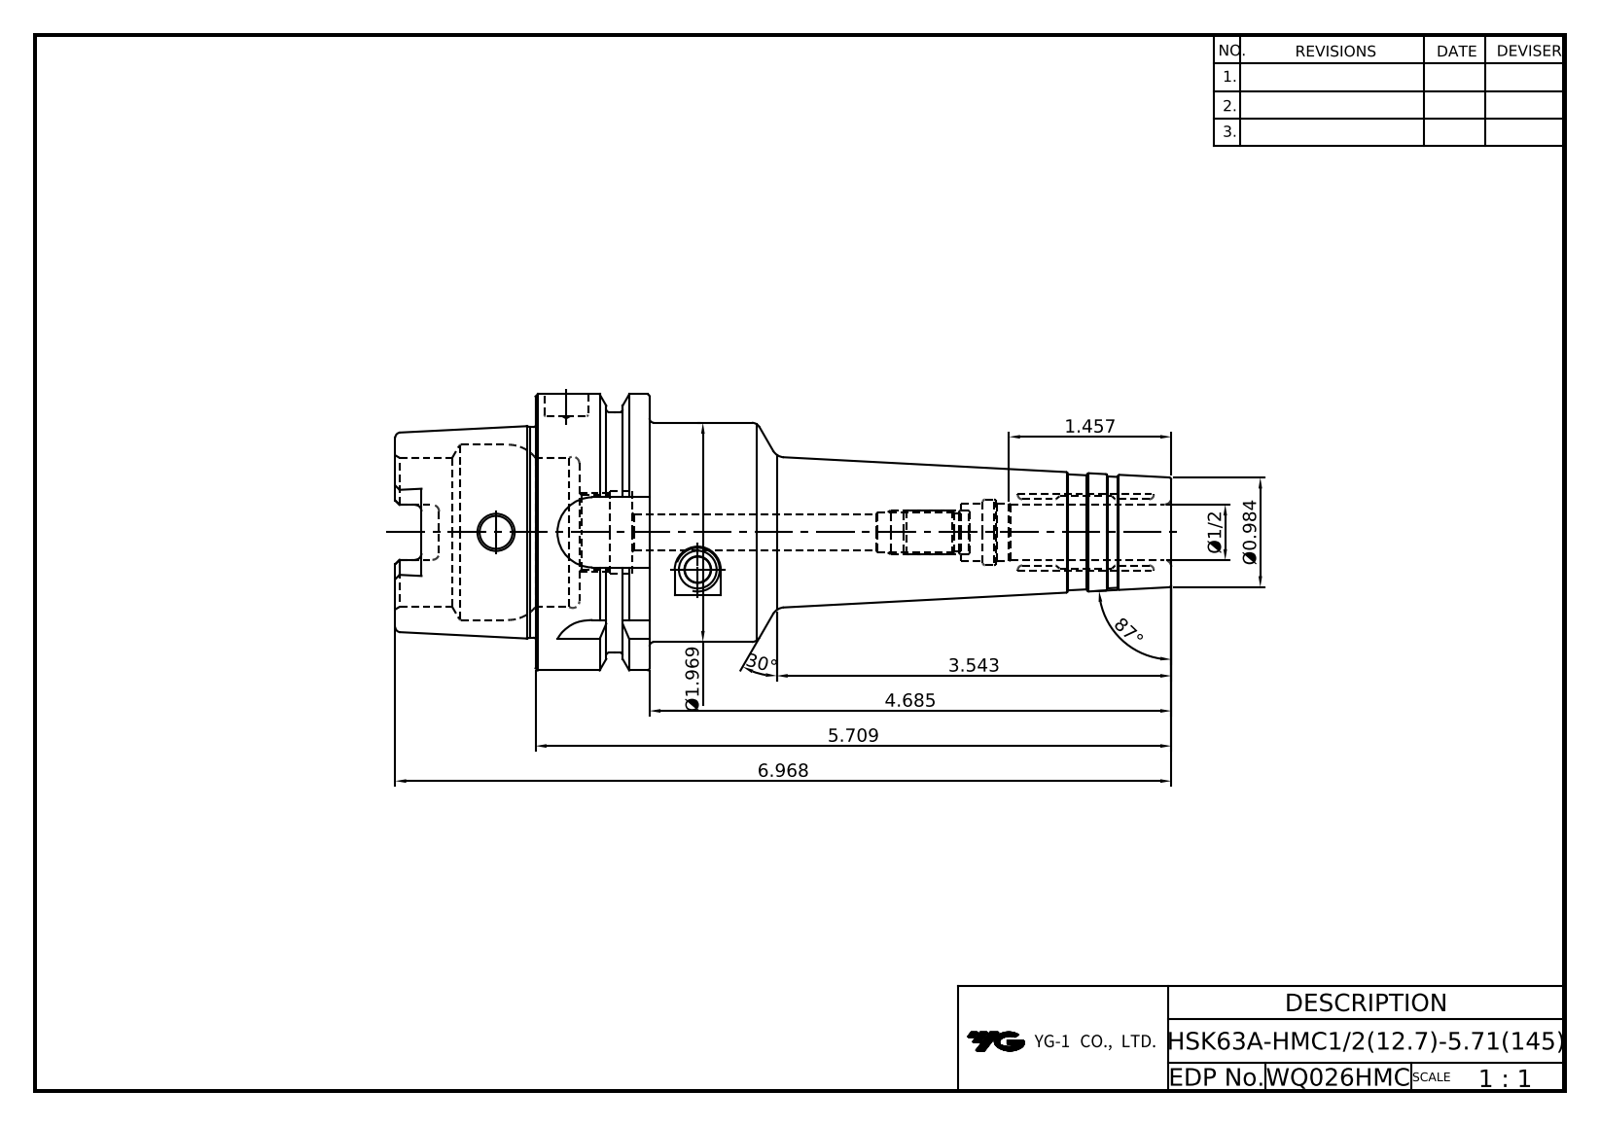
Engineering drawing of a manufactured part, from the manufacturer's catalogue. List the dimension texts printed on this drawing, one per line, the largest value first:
87°
30°
6.968
5.709
4.685
3.543
Ø1.969
1.457
Ø0.984
Ø1/2
